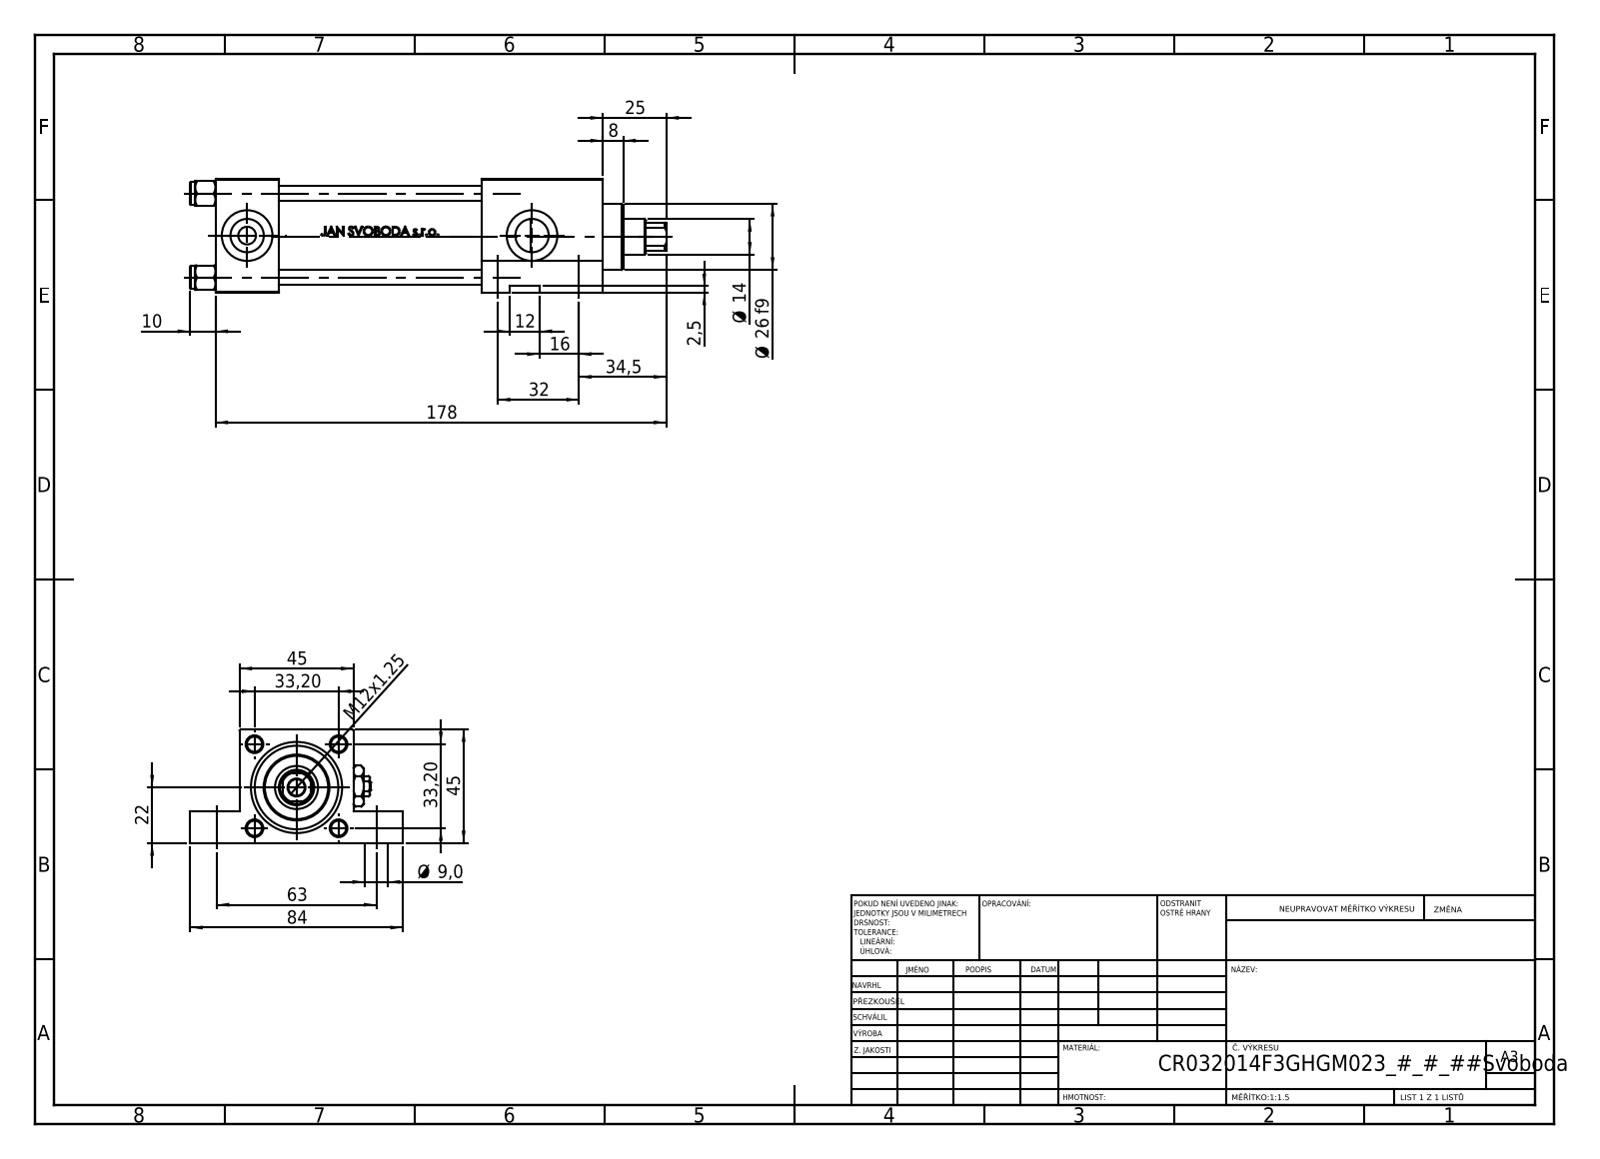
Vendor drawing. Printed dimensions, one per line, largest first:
178
84
63
45
45
34,5
33,20
33,20
32
Ø 26 f9
25
22
16
Ø 14
12
M12x1.25
10
Ø 9,0
8
2,5
